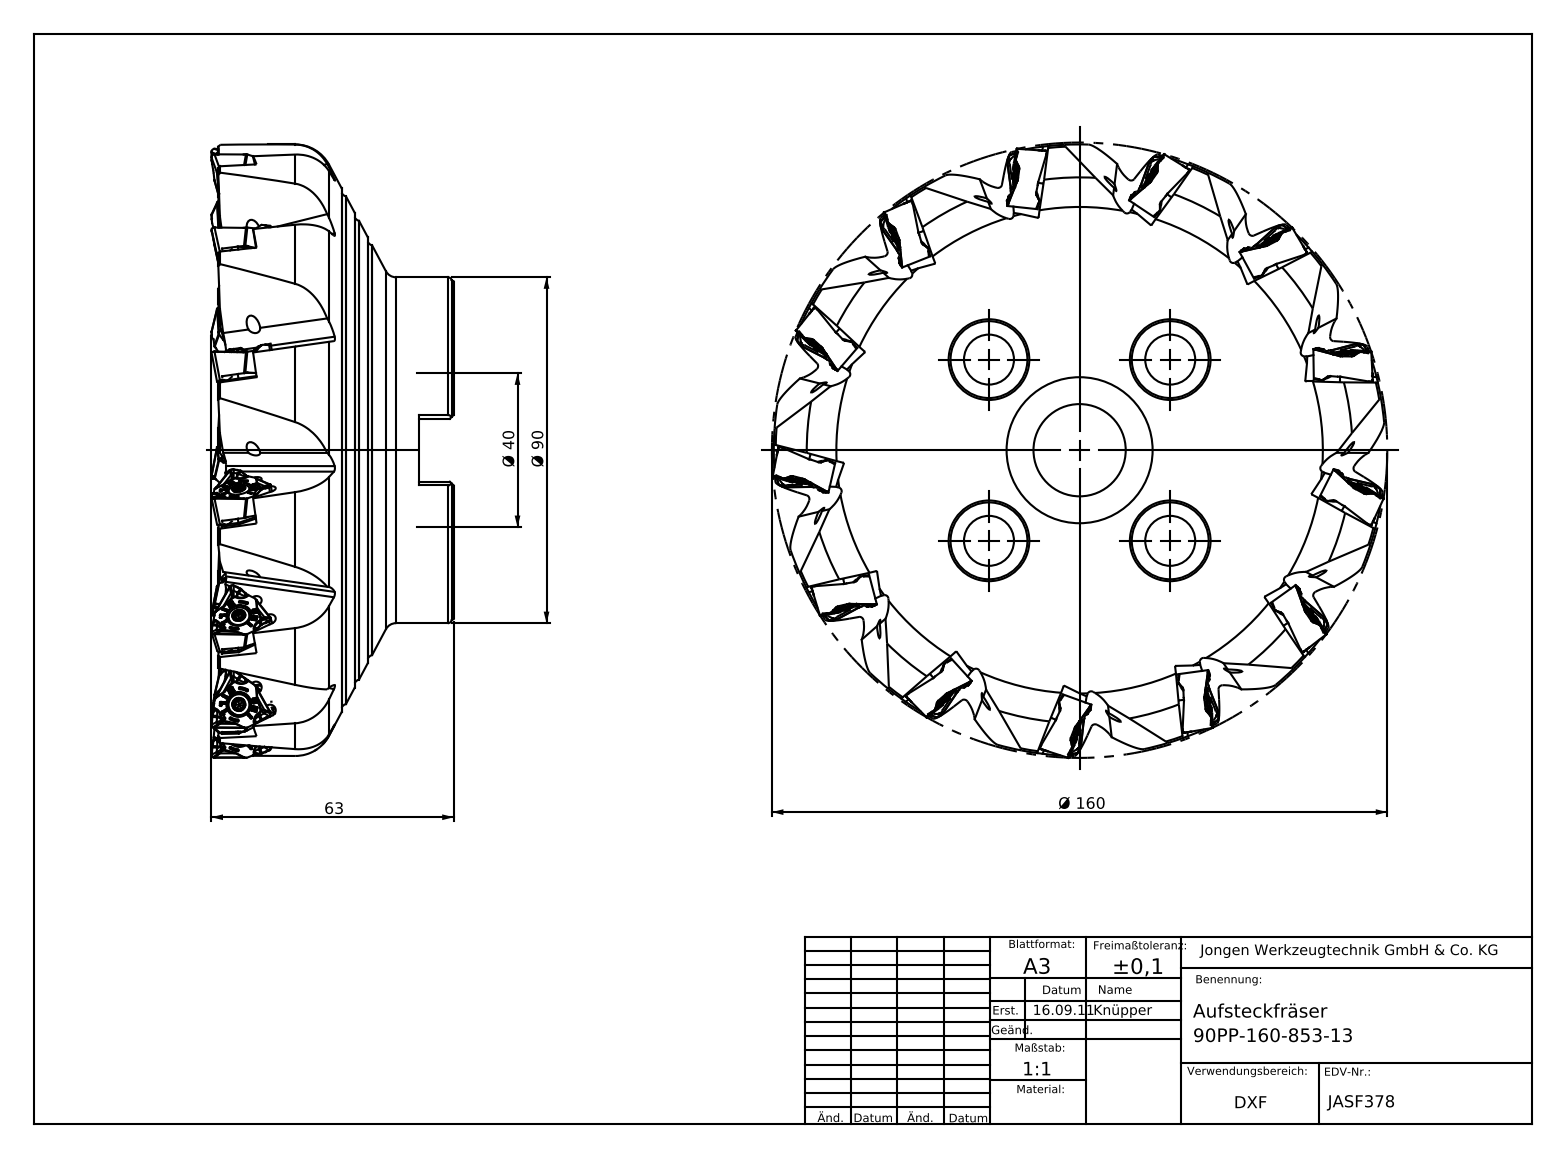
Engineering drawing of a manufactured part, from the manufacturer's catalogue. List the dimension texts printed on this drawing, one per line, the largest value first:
Ø 160
Ø 90
63
Ø 40
